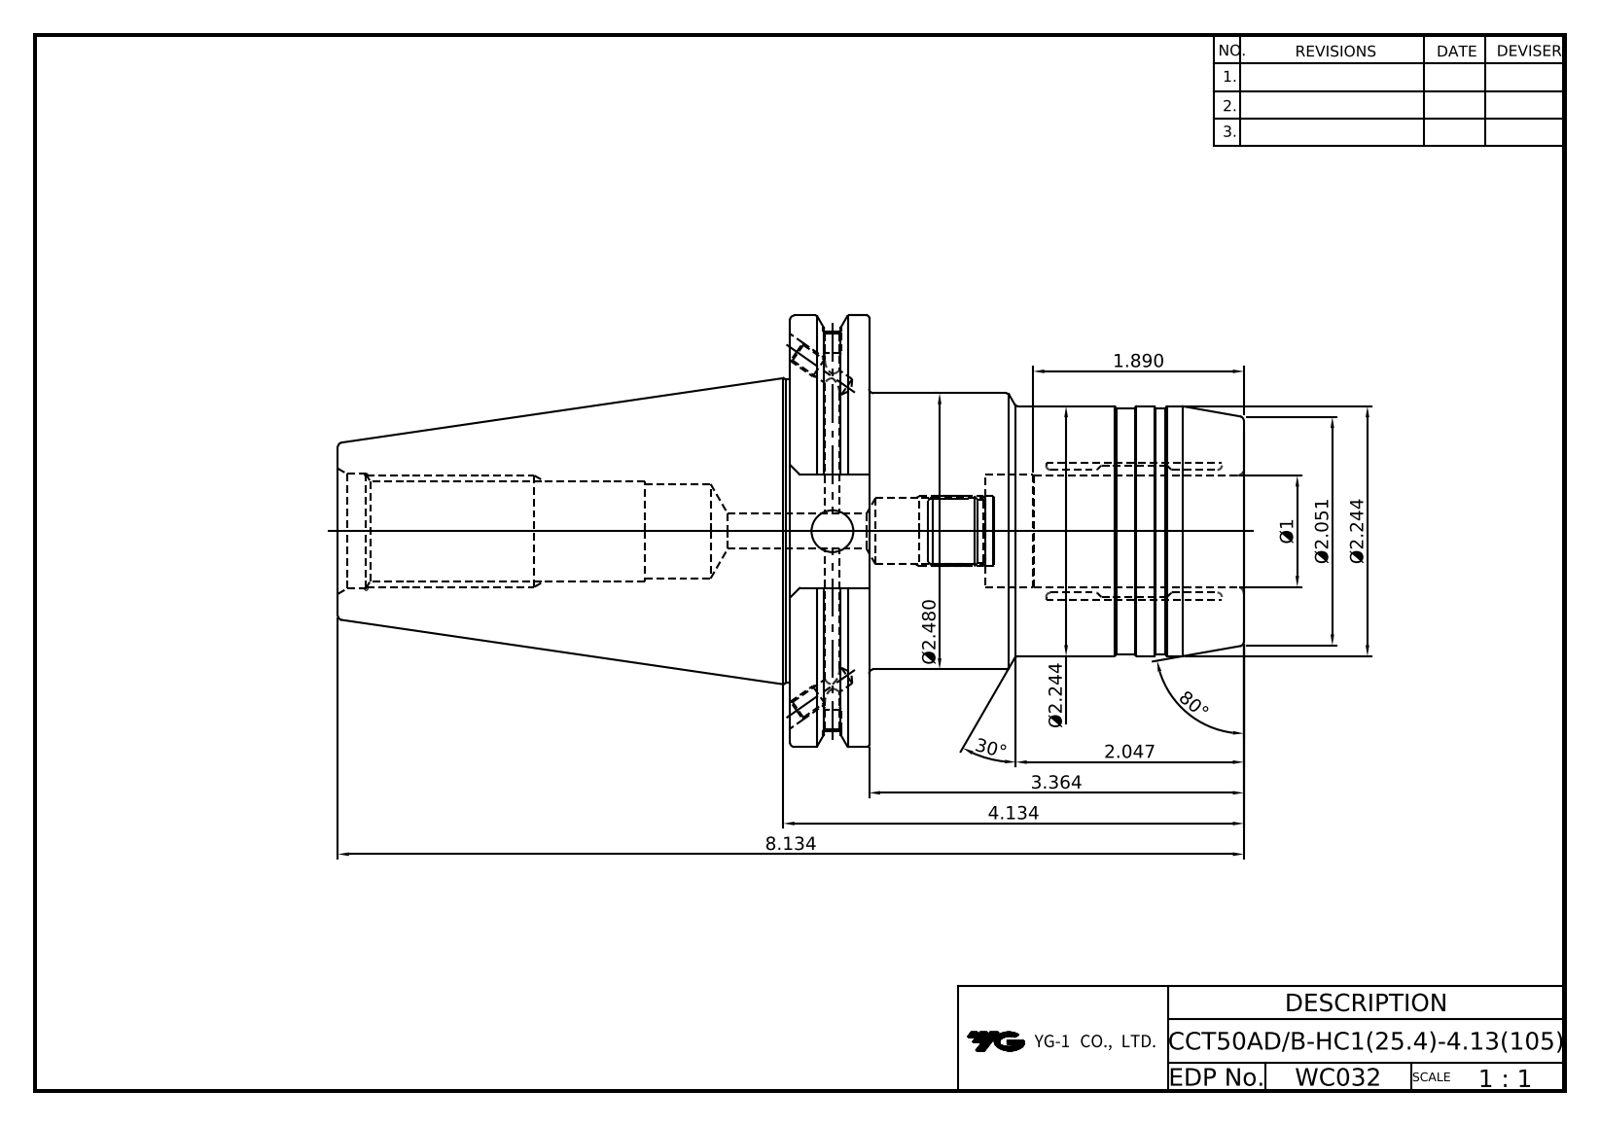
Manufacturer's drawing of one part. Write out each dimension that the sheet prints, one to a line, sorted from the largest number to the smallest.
80°
30°
8.134
4.134
3.364
Ø2.480
Ø2.244
Ø2.244
Ø2.051
2.047
1.890
Ø1
